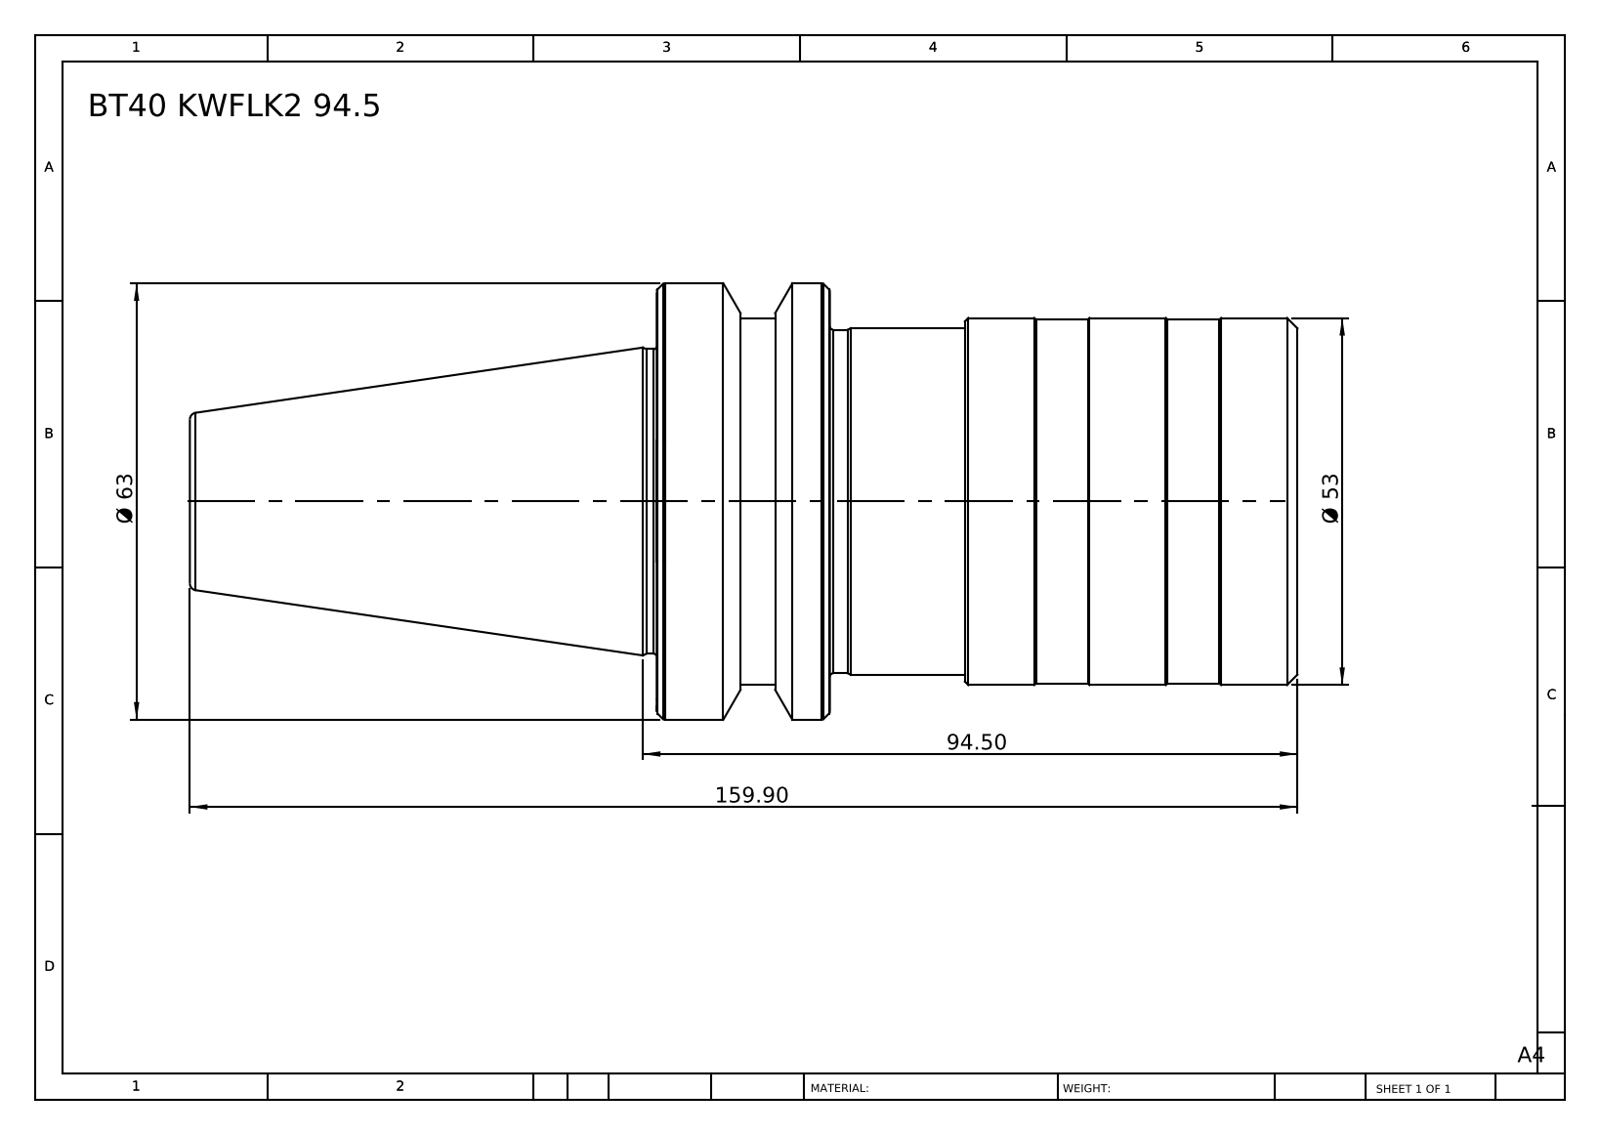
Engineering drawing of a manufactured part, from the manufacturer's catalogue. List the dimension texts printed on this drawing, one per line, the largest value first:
159.90
94.50
Ø 63
Ø 53
